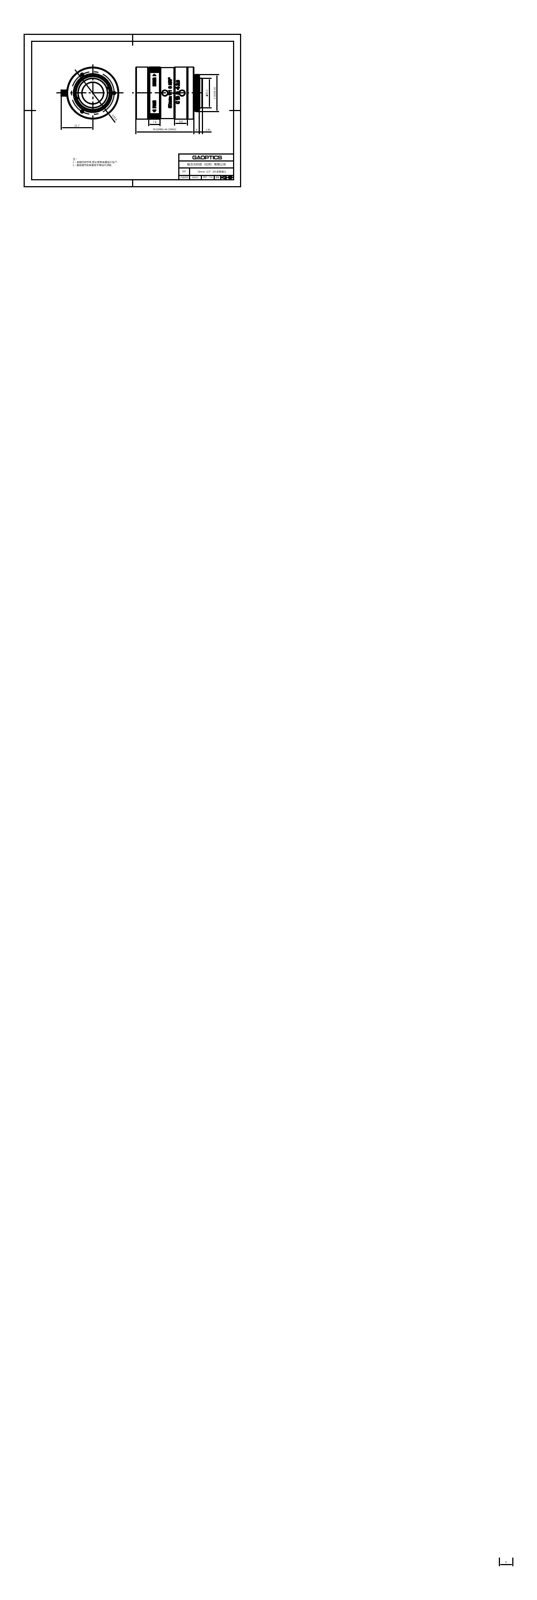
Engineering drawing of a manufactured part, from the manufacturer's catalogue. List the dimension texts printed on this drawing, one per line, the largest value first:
39.6(MIN)-44.3(MAX)
∅35.6
21.7
Ø20.2
9
8.6
7.8
4
1.91
1-32UN-2A
